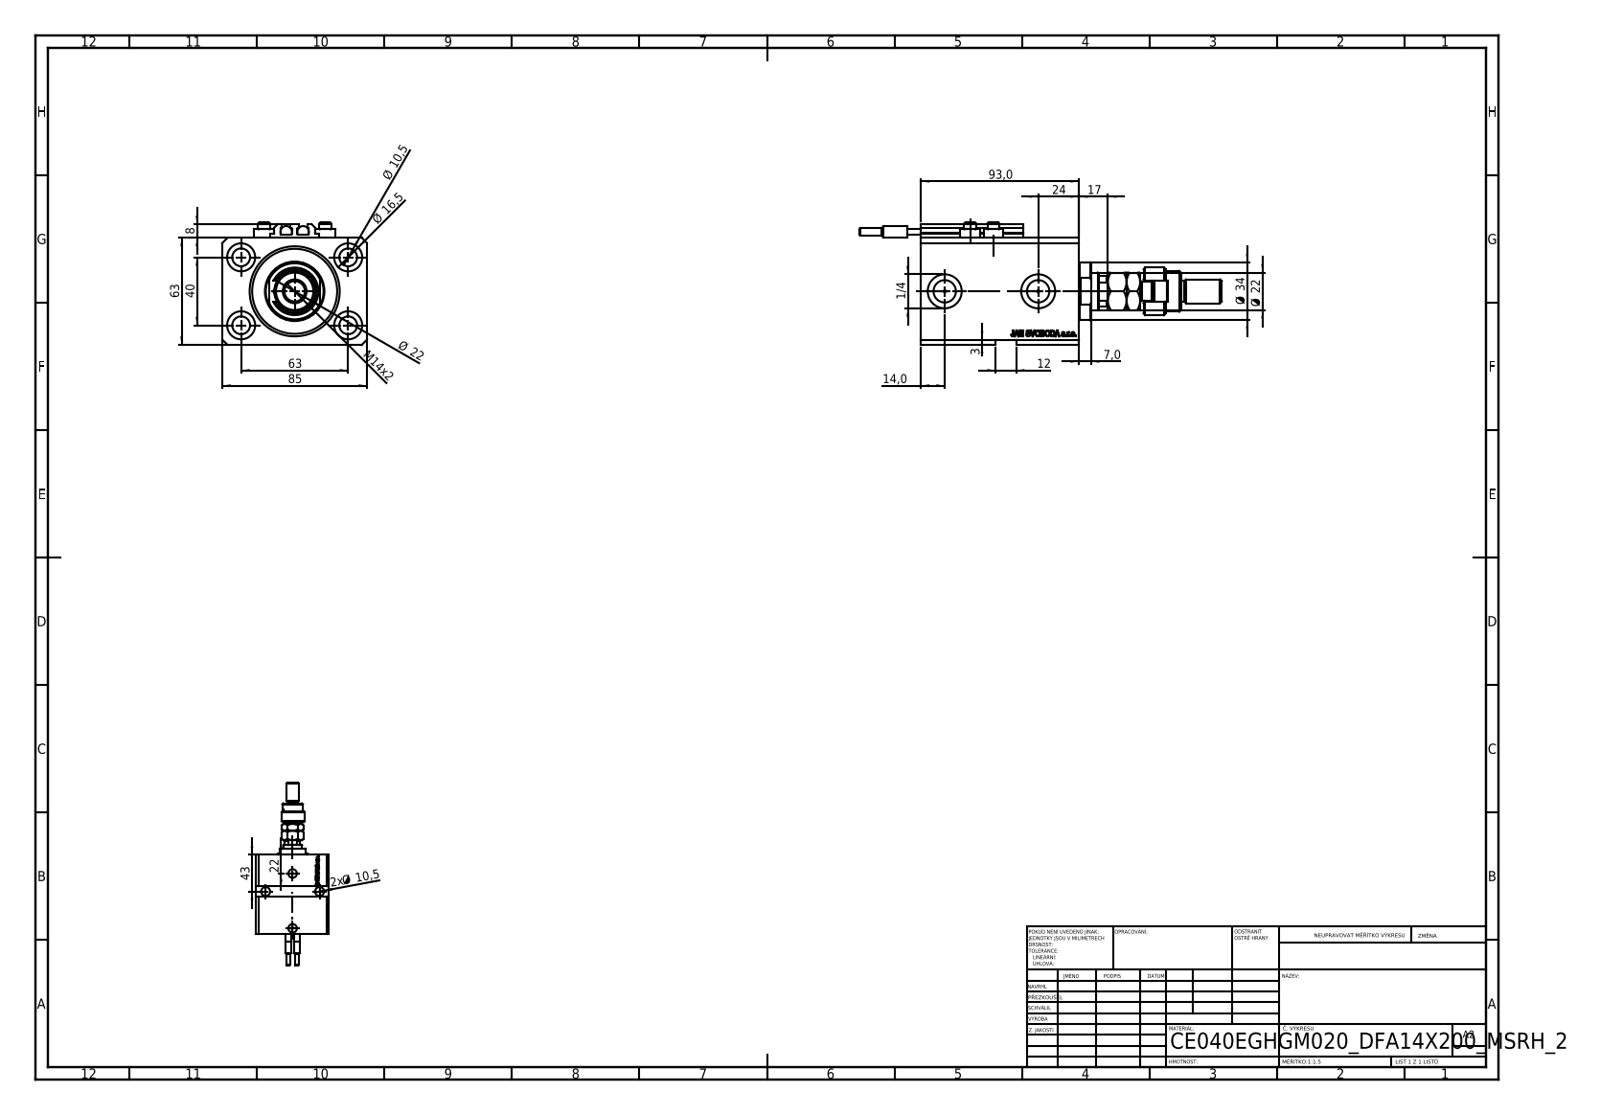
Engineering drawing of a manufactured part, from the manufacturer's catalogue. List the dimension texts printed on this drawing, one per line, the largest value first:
93,0
85
63
63
43
40
Ø 34
24
Ø 22
Ø 22
22
17
Ø 16,5
M14x2
14,0
12
Ø 10,5
2x Ø 10,5
8
7,0
3
1/4
